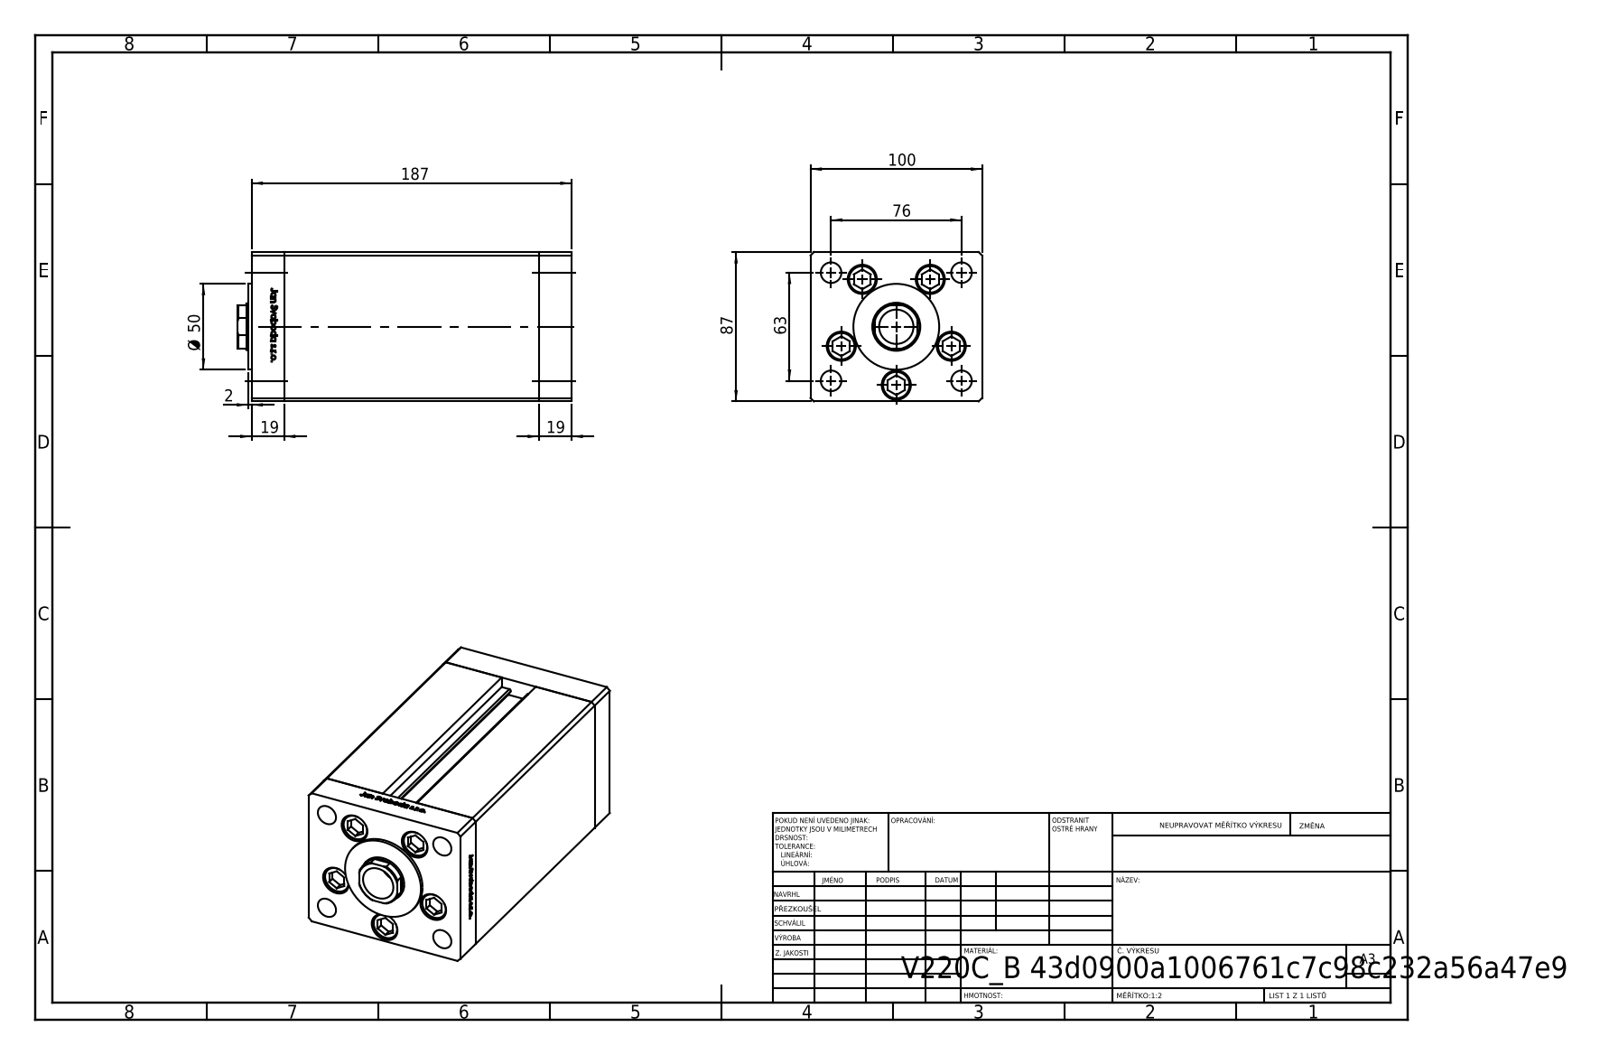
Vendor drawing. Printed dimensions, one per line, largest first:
187
100
87
76
63
Ø 50
19
19
2
